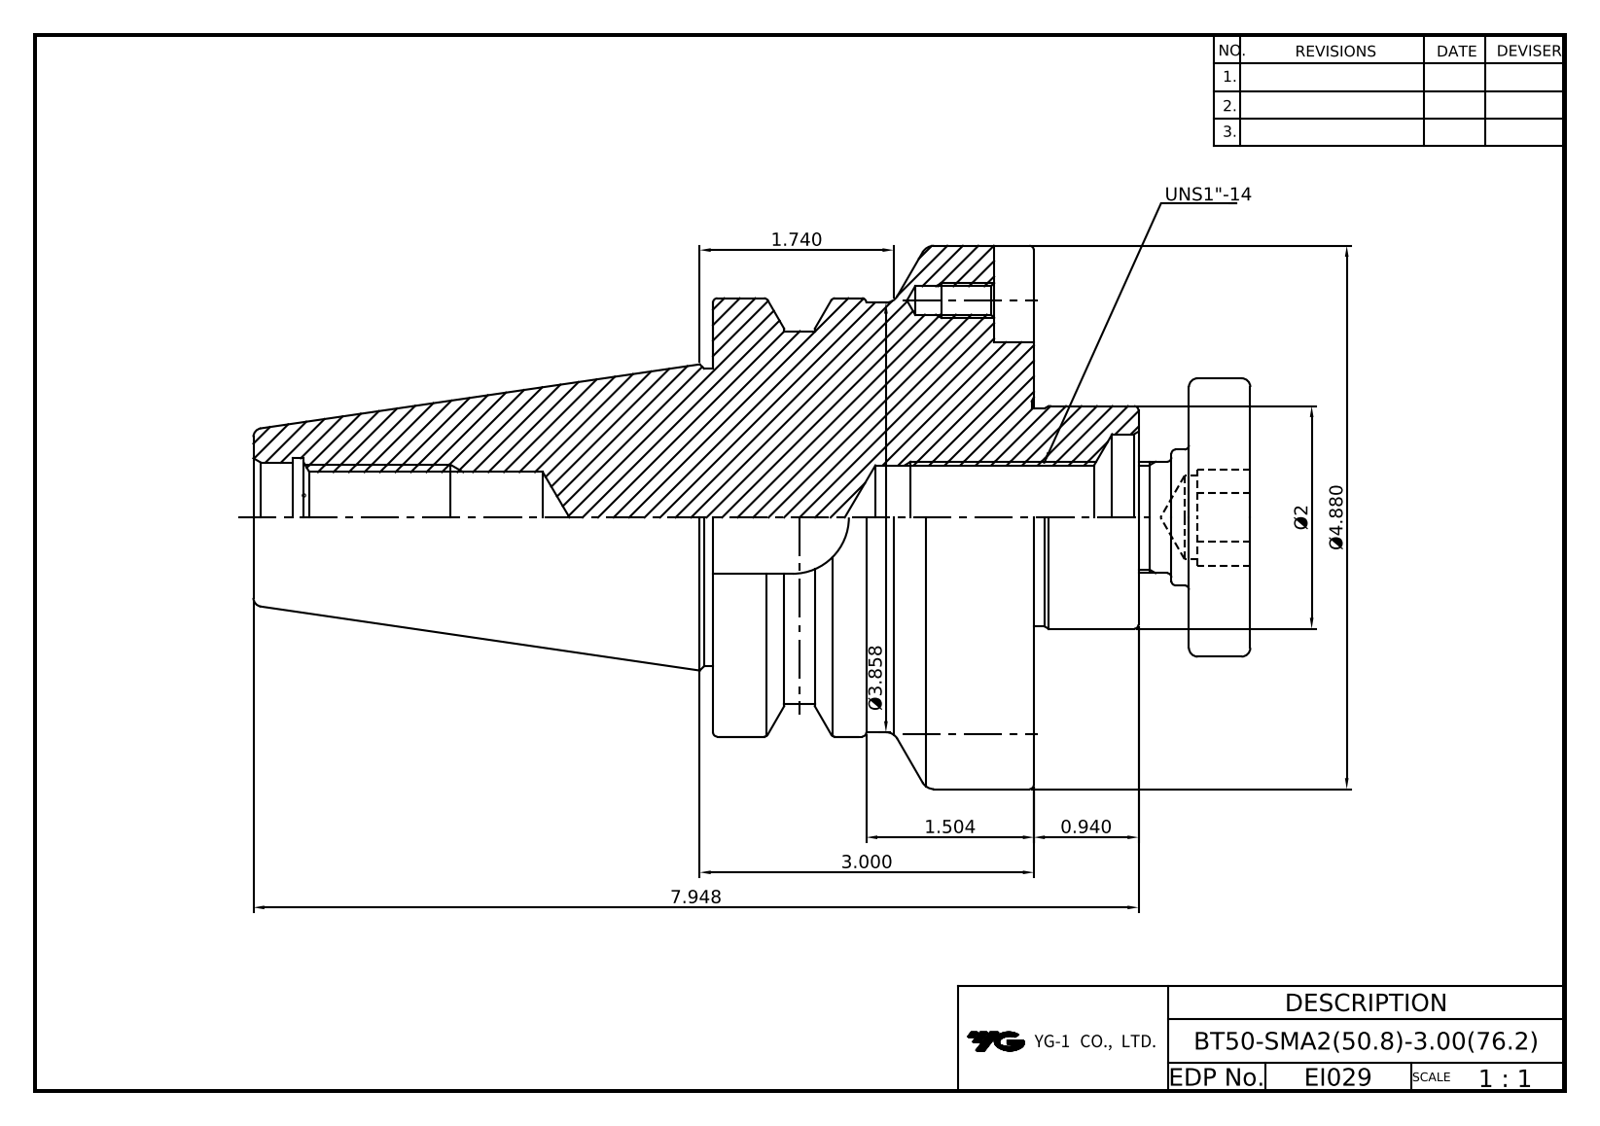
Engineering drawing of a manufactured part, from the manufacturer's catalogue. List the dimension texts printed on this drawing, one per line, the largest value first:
7.948
Ø4.880
Ø3.858
3.000
Ø2
1.740
1.504
0.940
